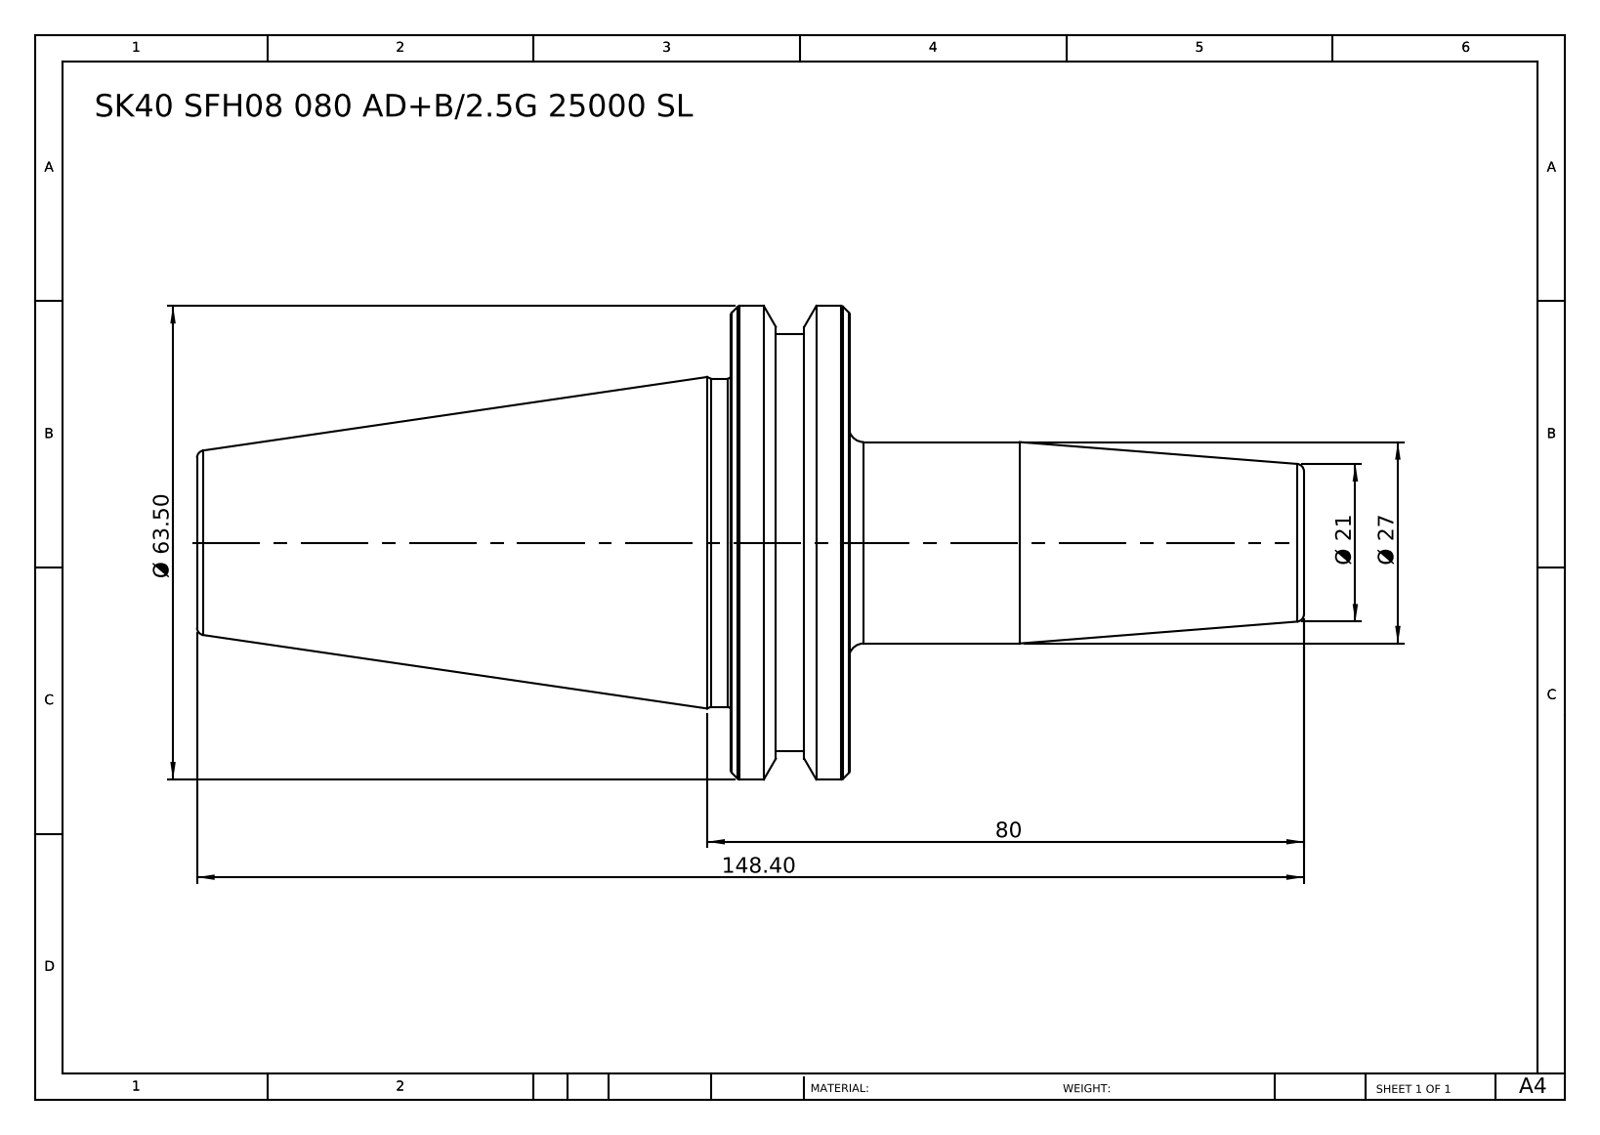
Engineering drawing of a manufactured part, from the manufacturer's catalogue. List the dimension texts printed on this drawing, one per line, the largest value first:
148.40
80
Ø 63.50
Ø 27
Ø 21
